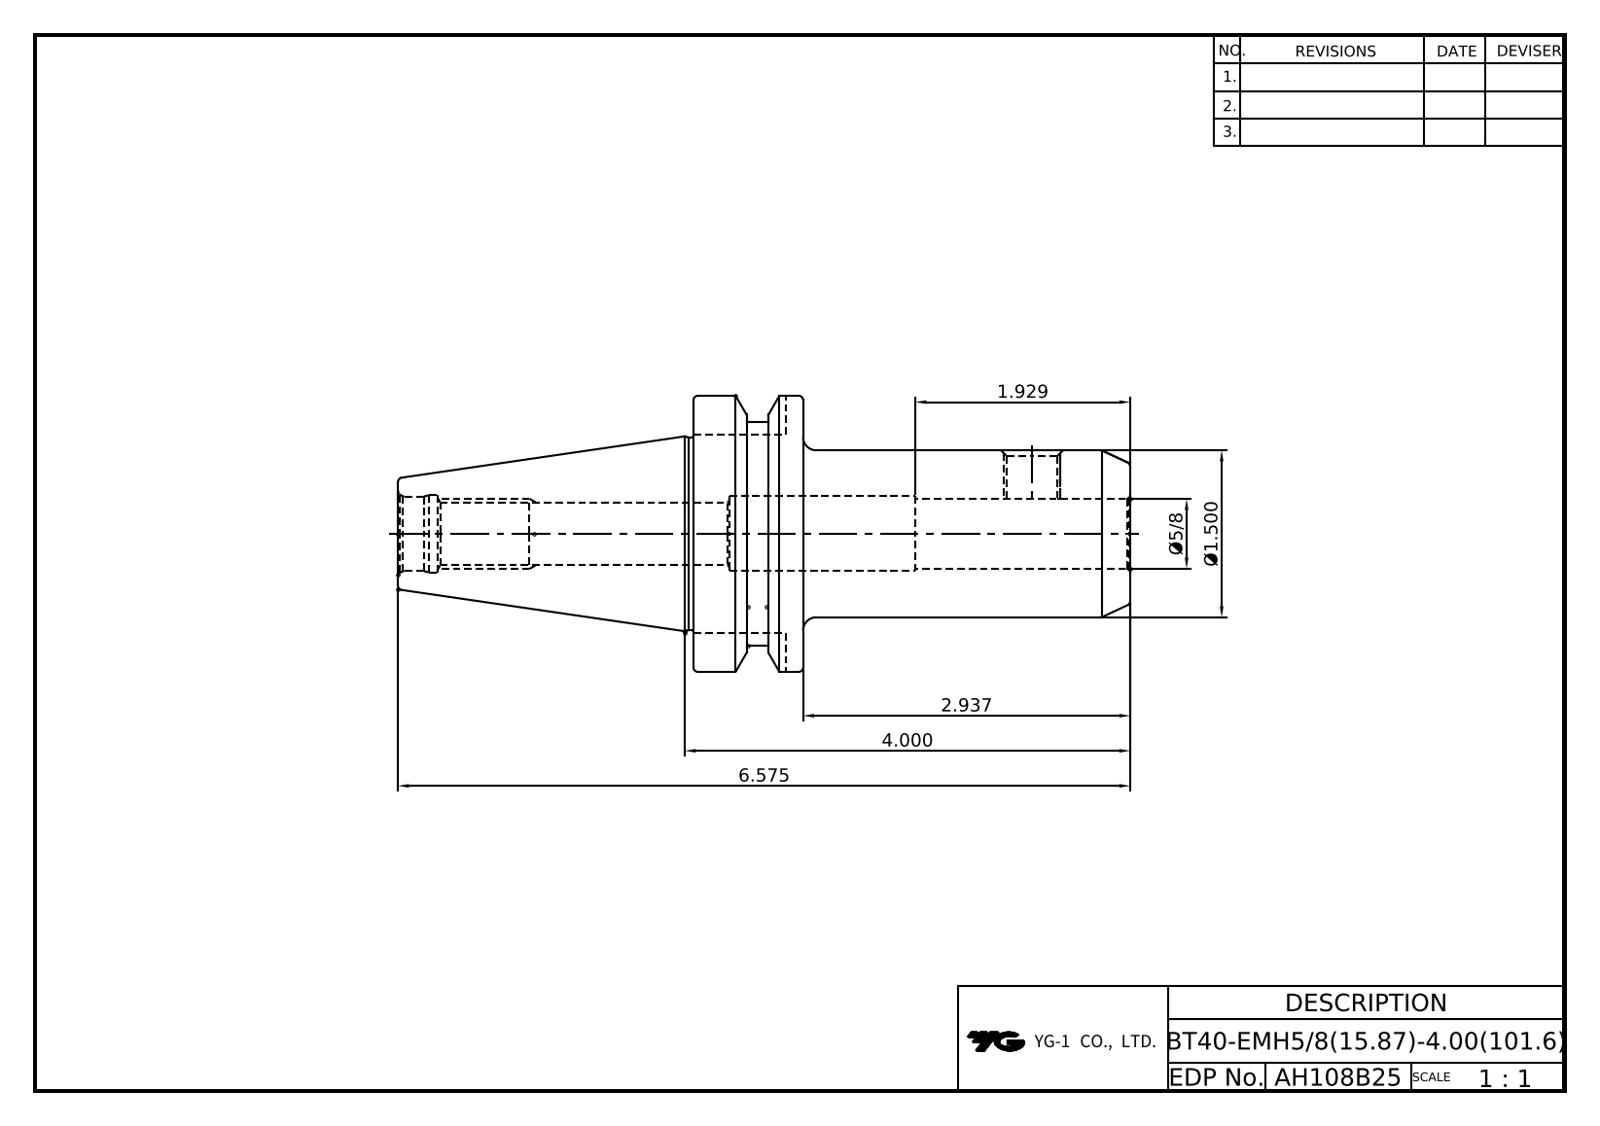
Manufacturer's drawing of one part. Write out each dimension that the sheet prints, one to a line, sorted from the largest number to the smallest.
6.575
4.000
2.937
1.929
Ø1.500
Ø5/8
